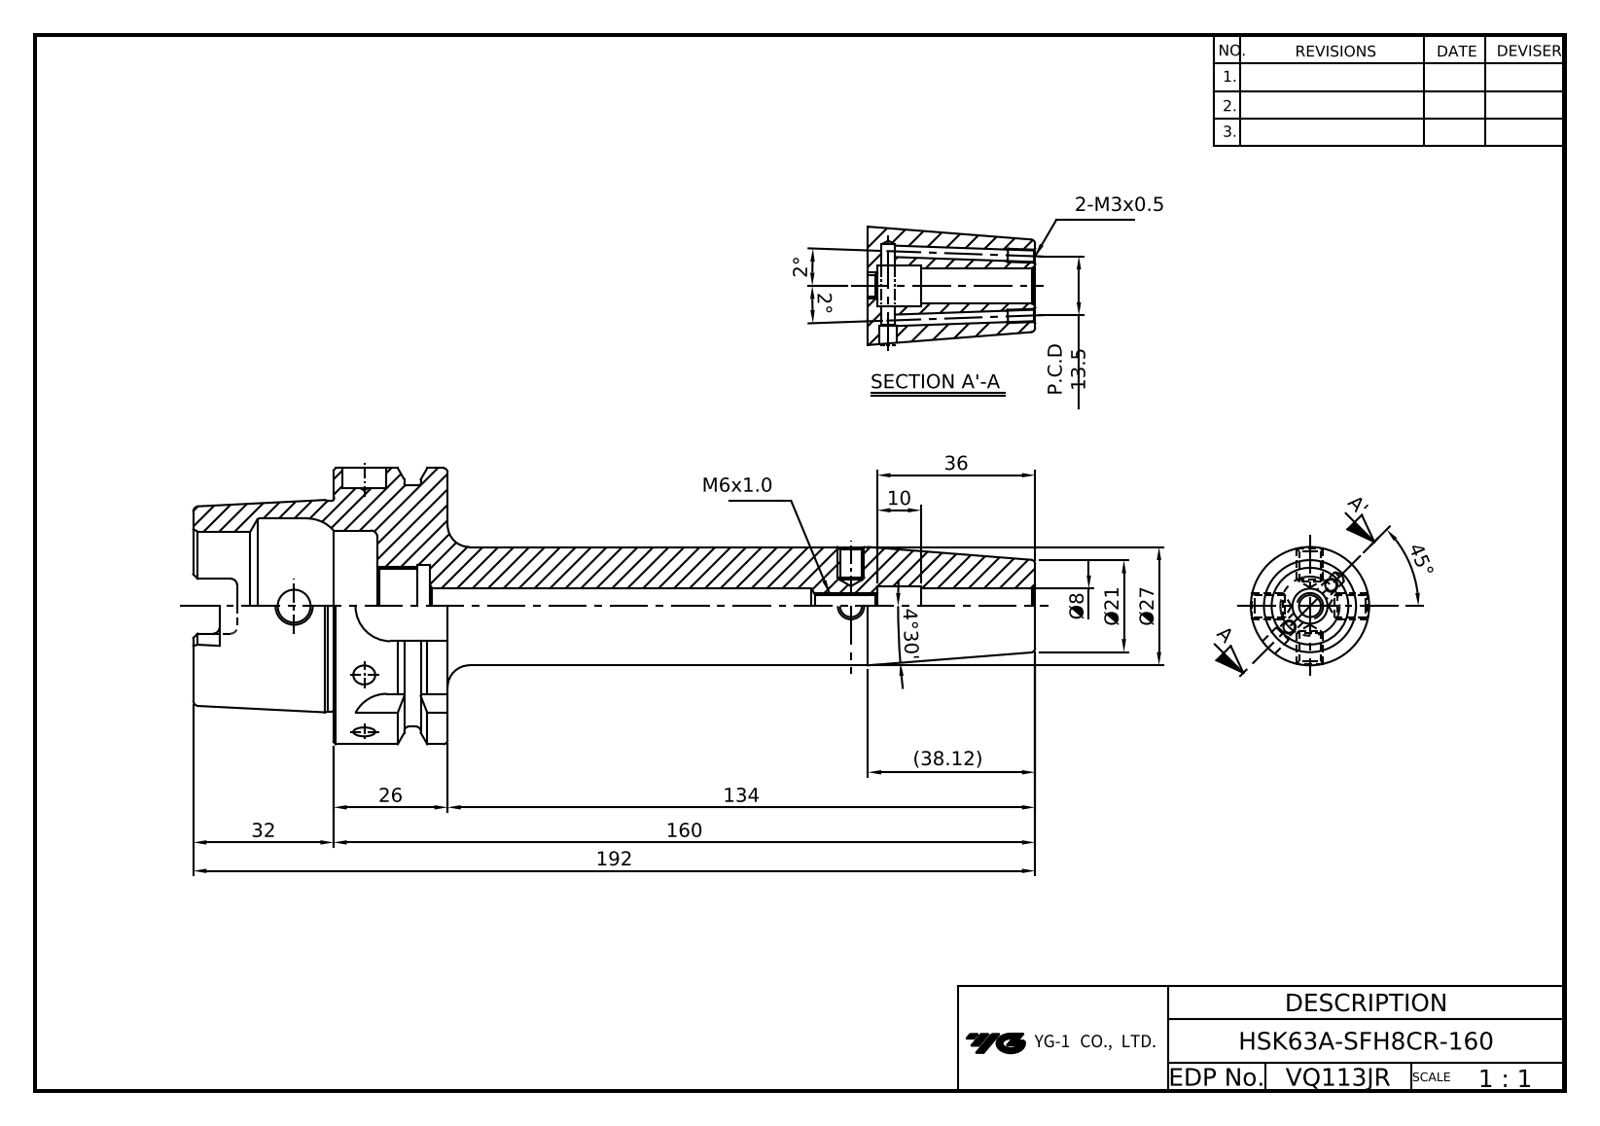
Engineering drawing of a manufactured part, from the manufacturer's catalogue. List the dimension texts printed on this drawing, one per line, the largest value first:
192
160
134
45°
(38.12)
36
32
Ø27
26
Ø21
P.C.D 13.5
10
Ø8
4°30'
2°
2°
